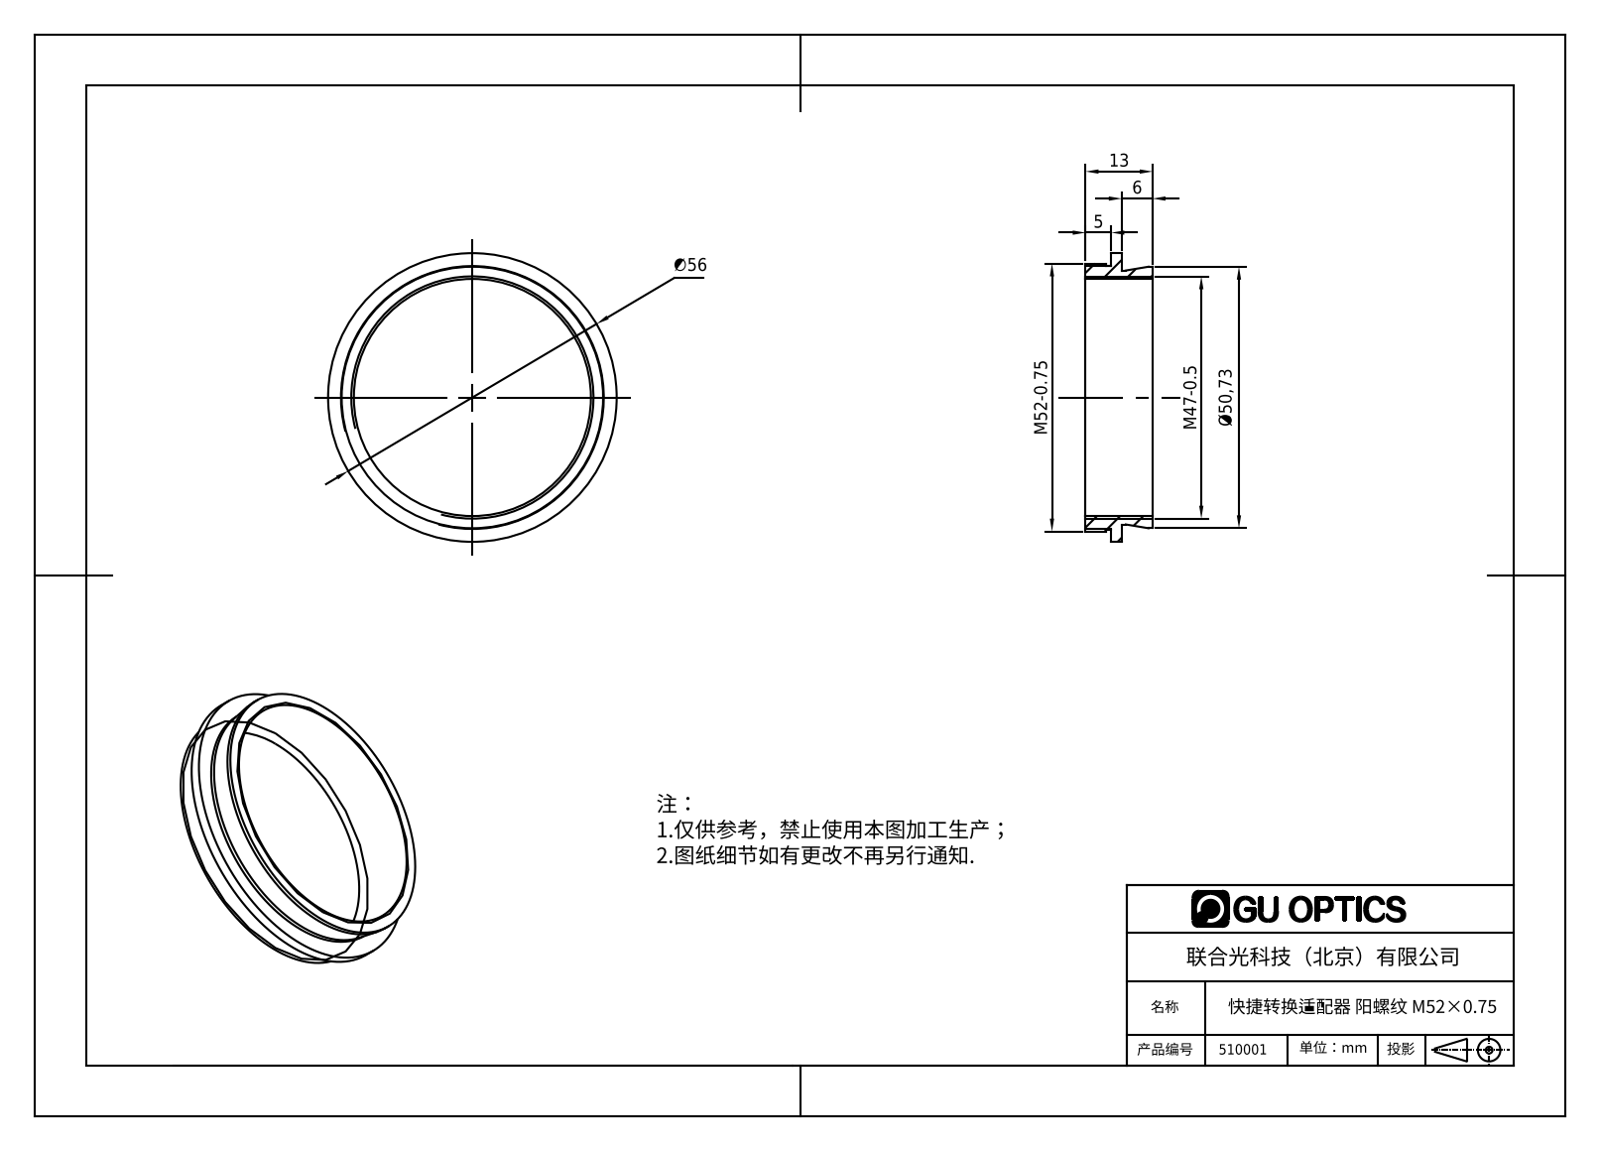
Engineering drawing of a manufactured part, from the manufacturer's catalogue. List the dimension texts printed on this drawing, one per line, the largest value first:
∅56
M52-0.75
Ø50,73
M47-0.5
13
6
5
